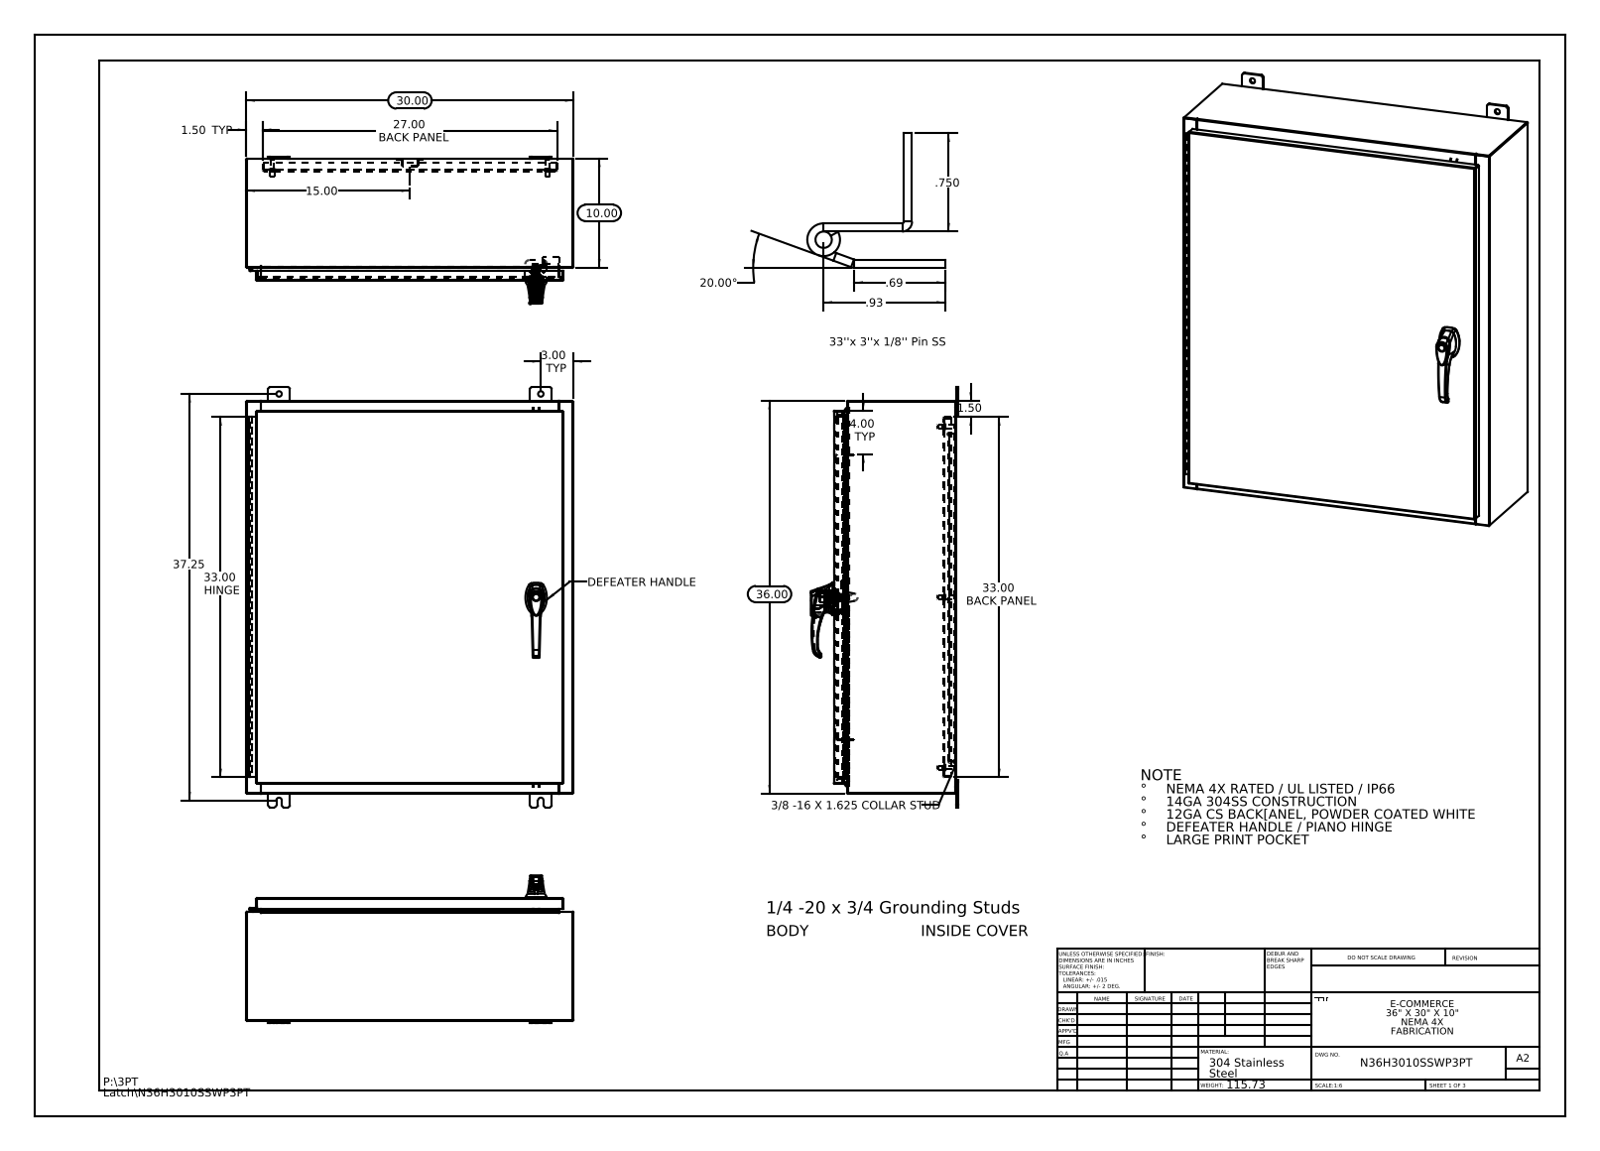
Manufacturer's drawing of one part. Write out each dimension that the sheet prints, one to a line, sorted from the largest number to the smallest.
37.25
36.00
33.00 HINGE
33.00 BACK PANEL
30.00
27.00 BACK PANEL
20.00°
15.00
10.00
4.00 TYP
3.00 TYP
1.50 TYP
1.50
.93
.750
.69
